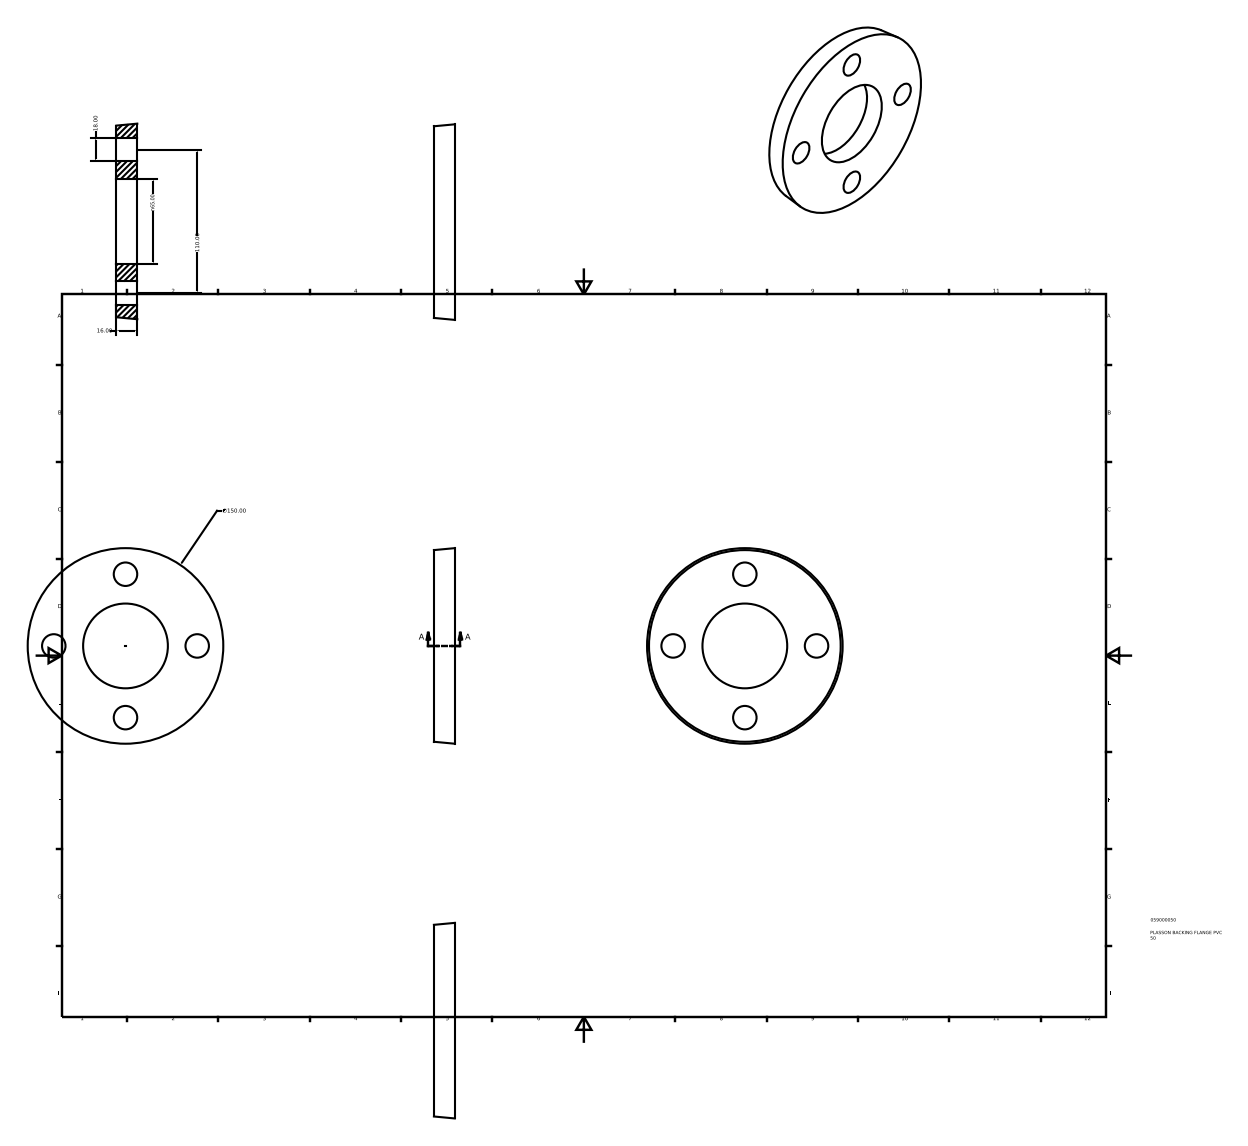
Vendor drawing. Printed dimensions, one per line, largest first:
∅150.00
110.00
n65.00
18.00
16.00
